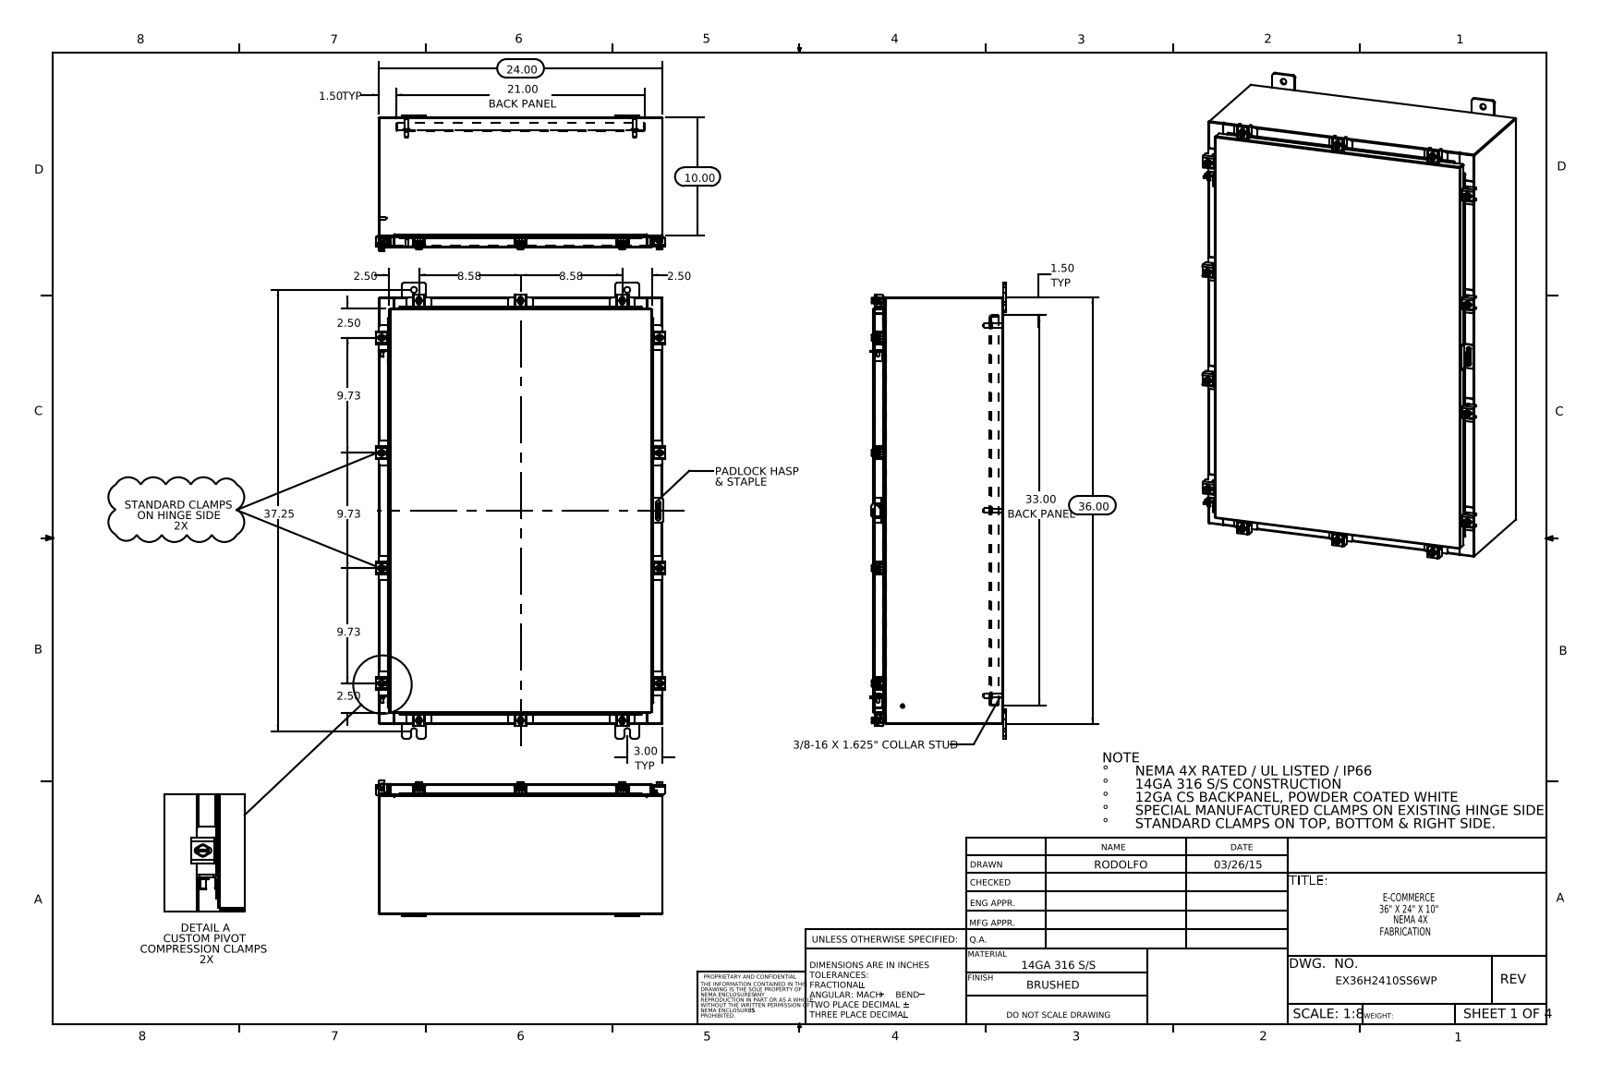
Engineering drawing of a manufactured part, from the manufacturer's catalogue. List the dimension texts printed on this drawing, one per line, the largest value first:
37.25
36.00
33.00 BACK PANEL
24.00
21.00 BACK PANEL
10.00
9.73
9.73
9.73
8.58
8.58
3.00 TYP
2.50
2.50
2.50
2.50
1.50 TYP
1.50 TYP
